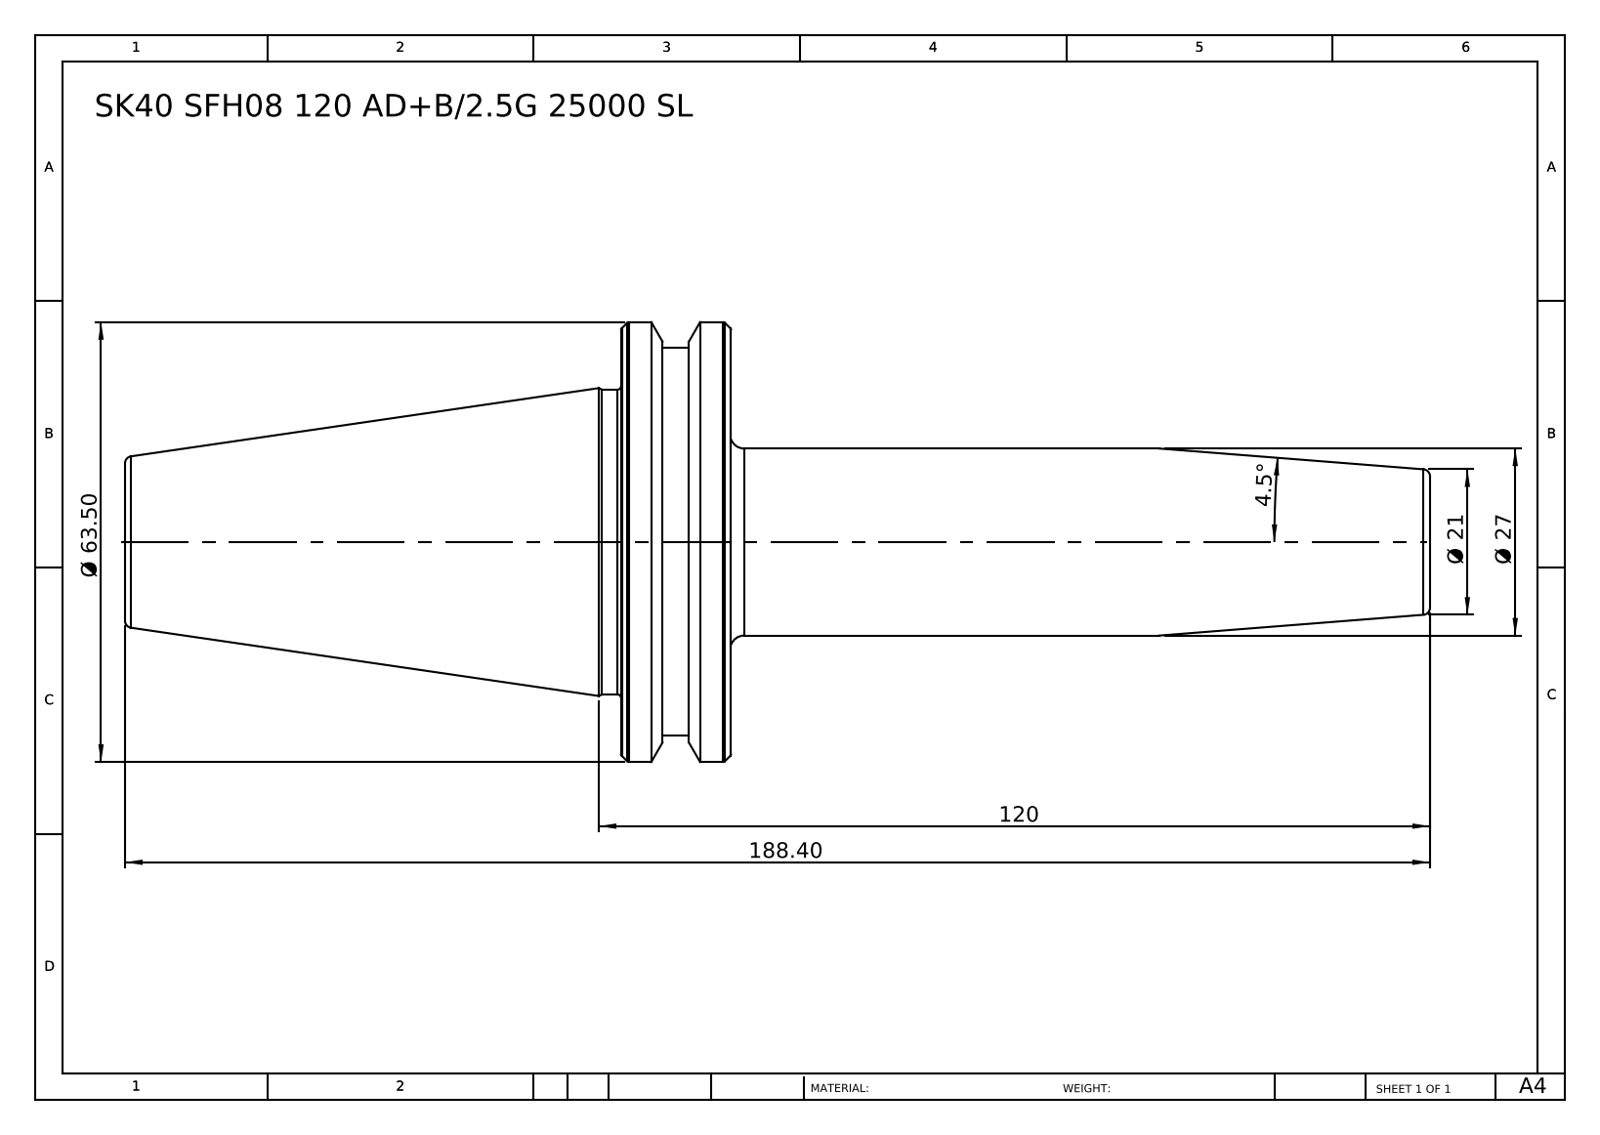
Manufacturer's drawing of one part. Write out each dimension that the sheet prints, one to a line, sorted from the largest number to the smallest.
188.40
120
Ø 63.50
Ø 27
Ø 21
4.5°
